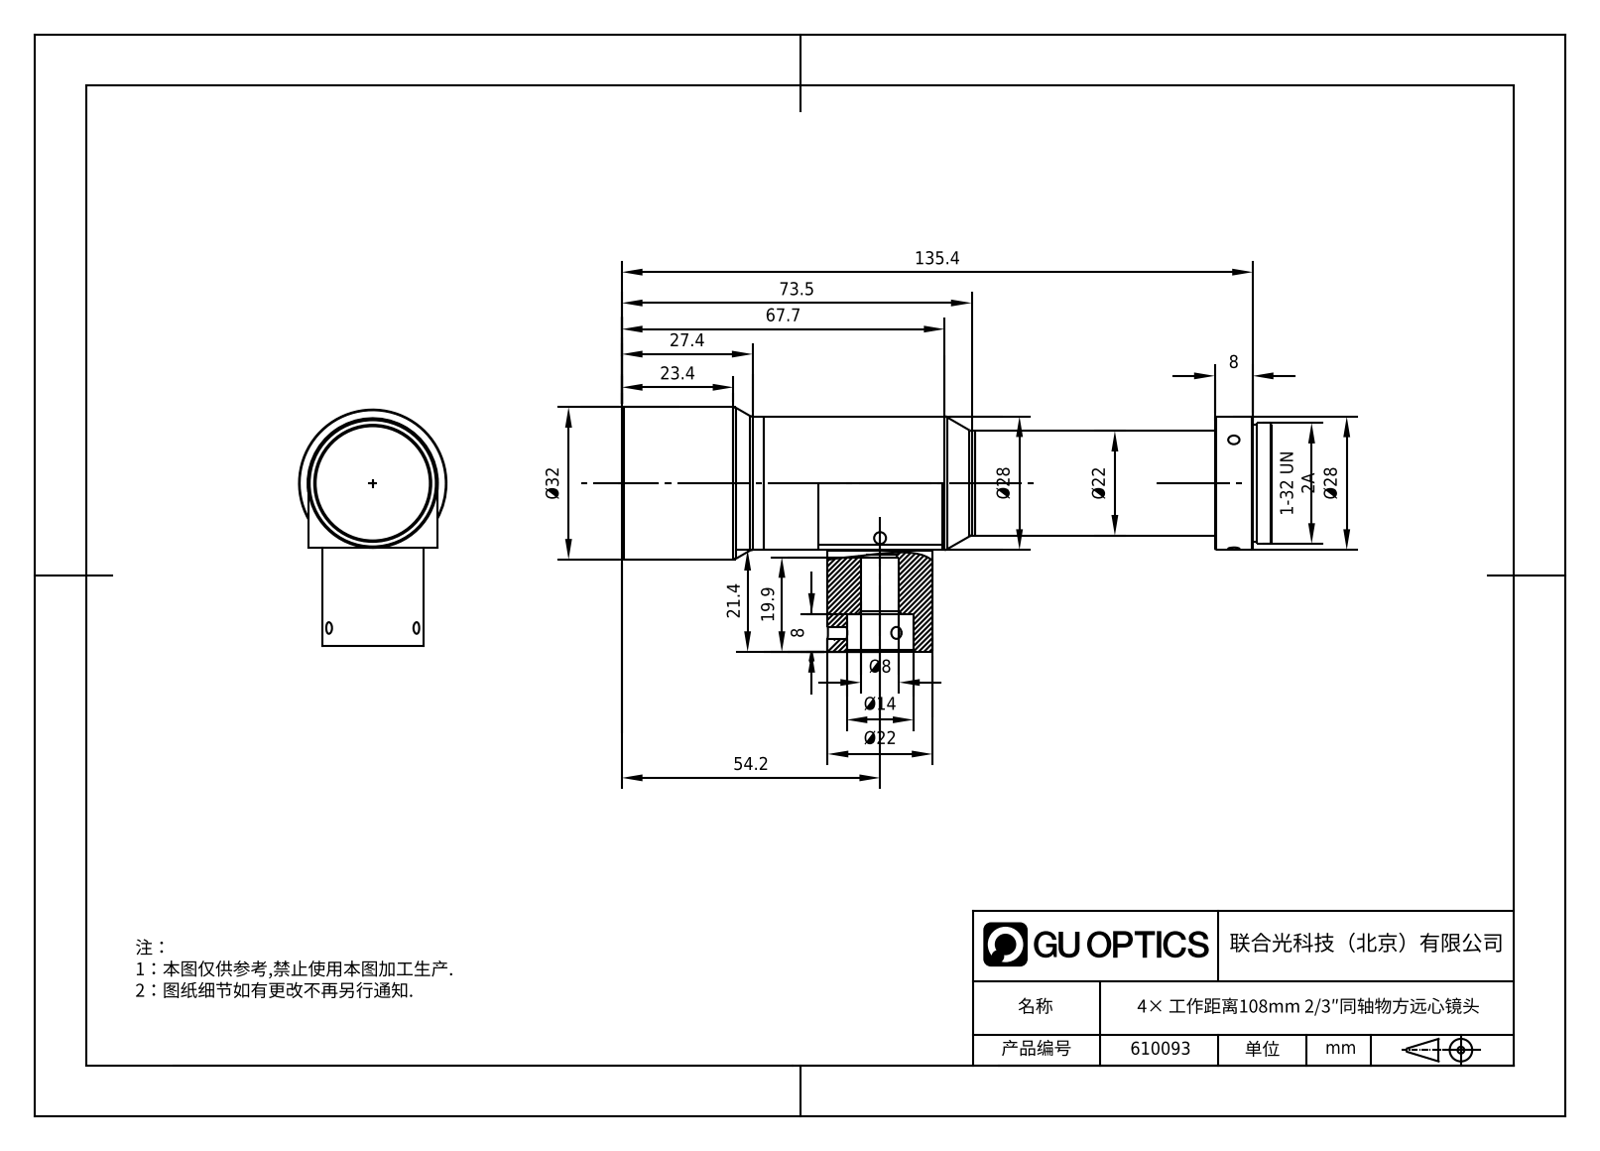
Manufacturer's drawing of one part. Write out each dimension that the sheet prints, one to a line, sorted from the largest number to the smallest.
135.4
73.5
67.7
54.2
Ø32
Ø28
Ø28
27.4
23.4
Ø22
Ø22
21.4
19.9
Ø14
Ø8
8
8
1-32 UN 2A
